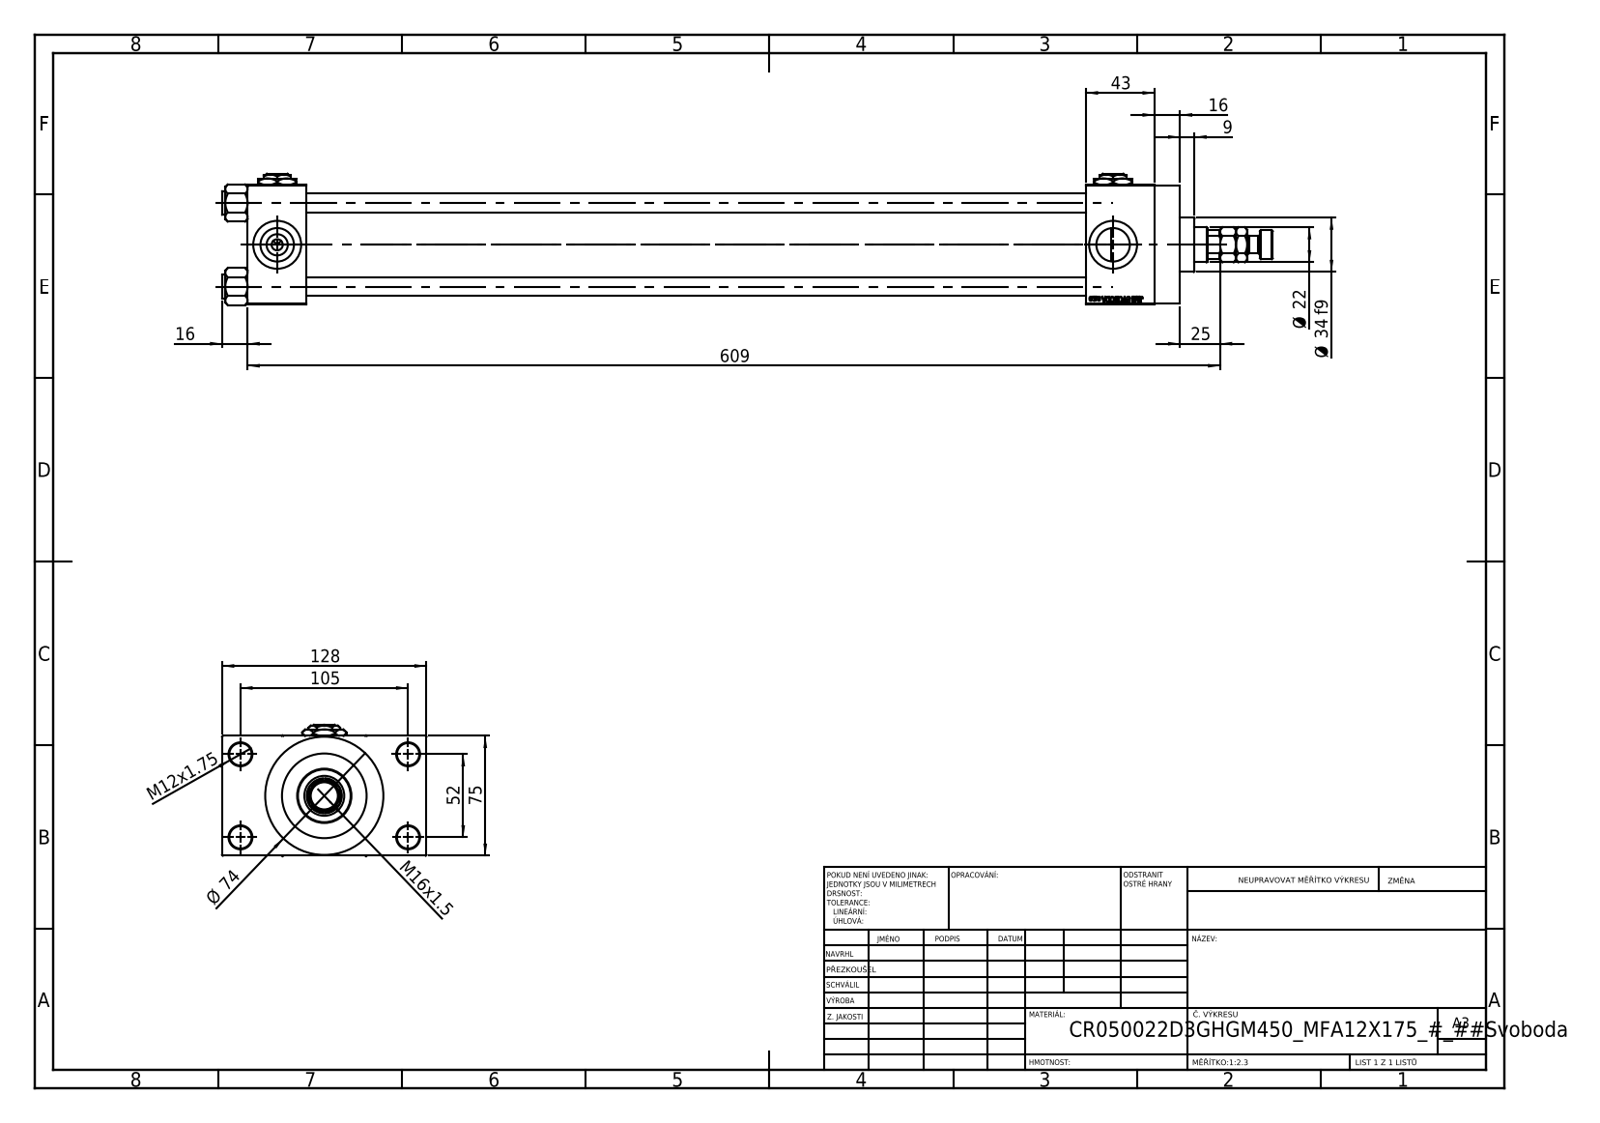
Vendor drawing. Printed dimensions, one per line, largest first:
609
128
105
75
Ø 74
52
43
Ø 34 f9
25
Ø 22
16
16
M16x1.5
M12x1.75
9
